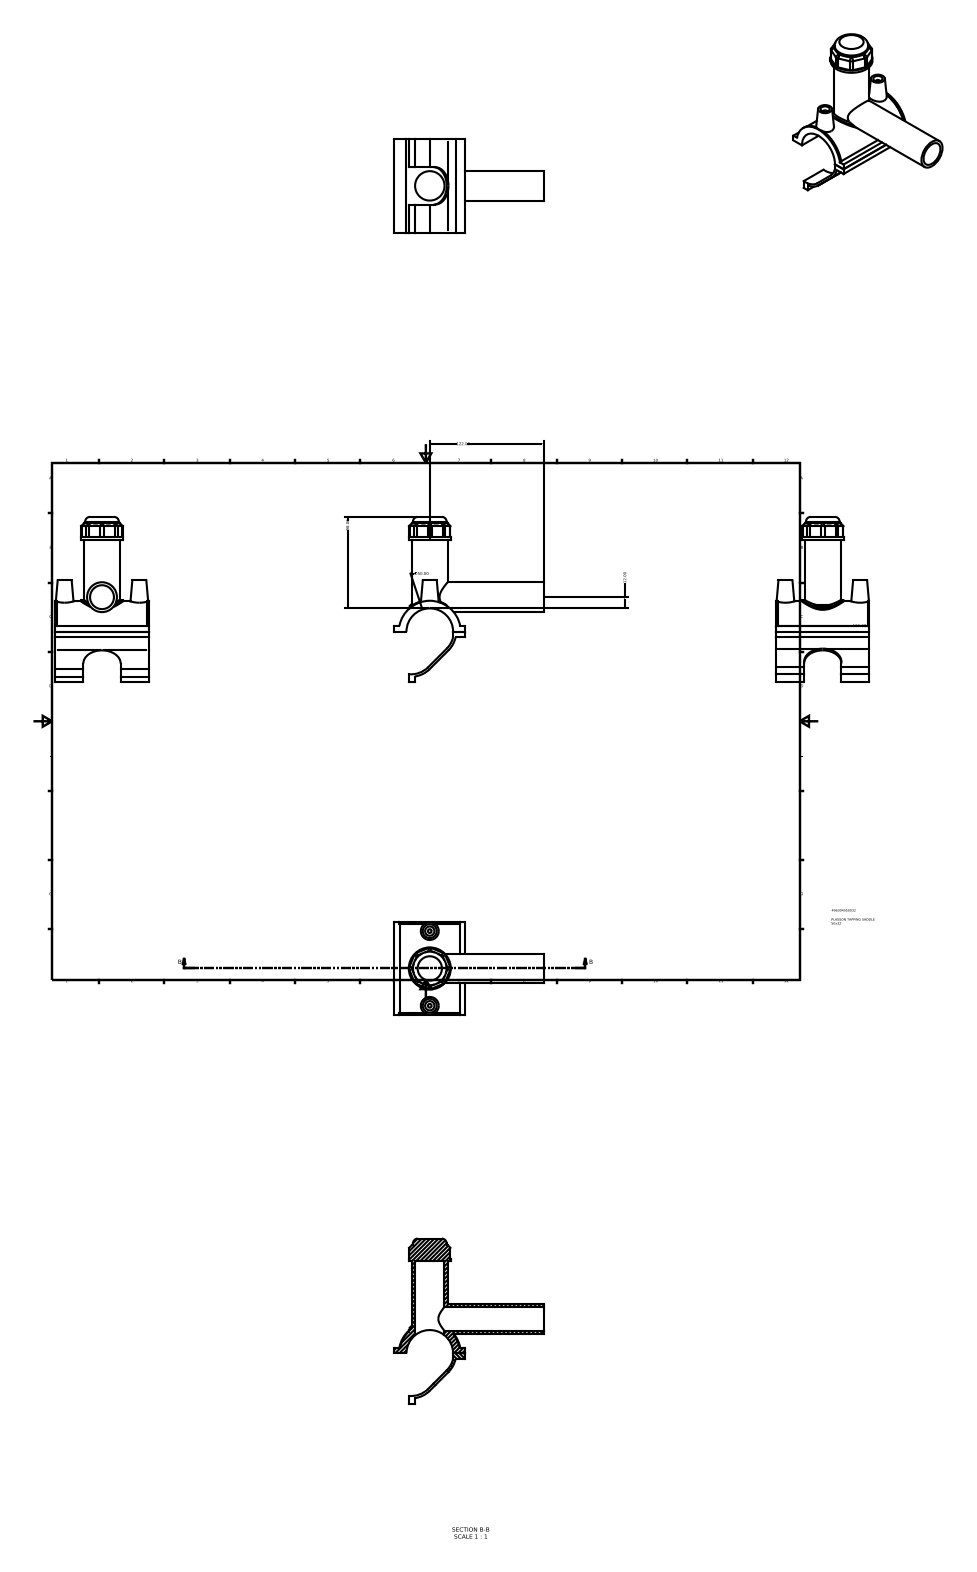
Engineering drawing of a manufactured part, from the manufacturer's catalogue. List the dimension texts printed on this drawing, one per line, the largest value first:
122.00
100.00
98.00
∅50.00
12.00
